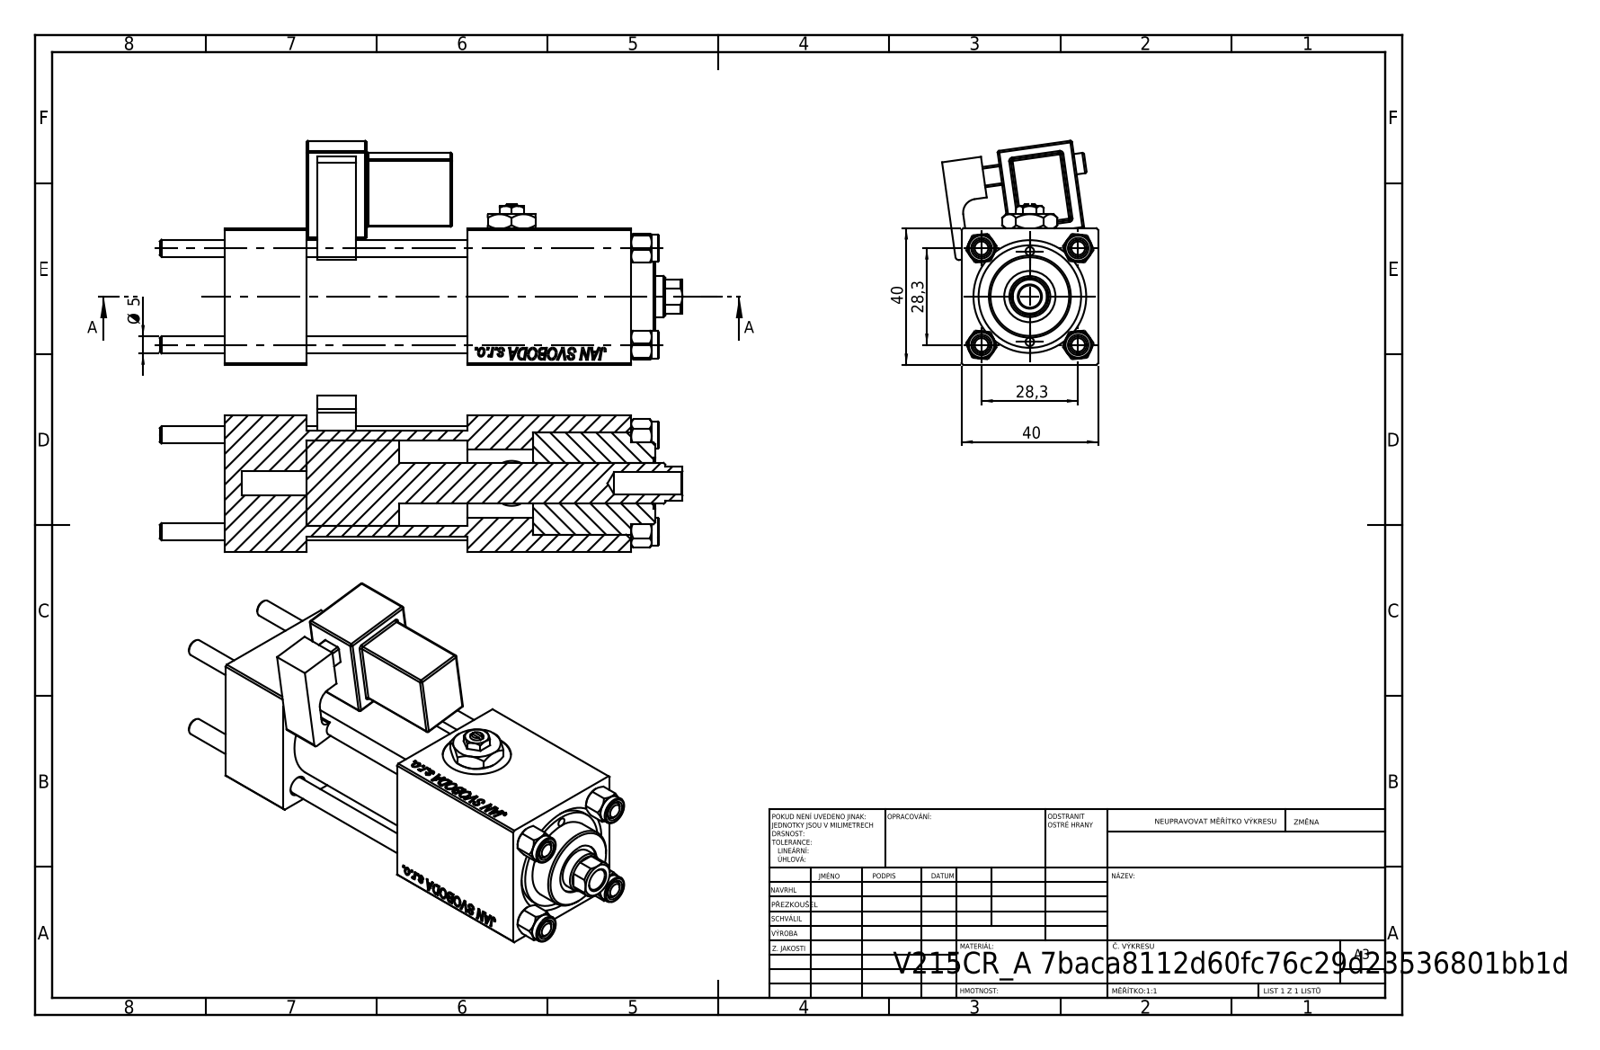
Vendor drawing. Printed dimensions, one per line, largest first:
40
40
28,3
28,3
Ø 5
